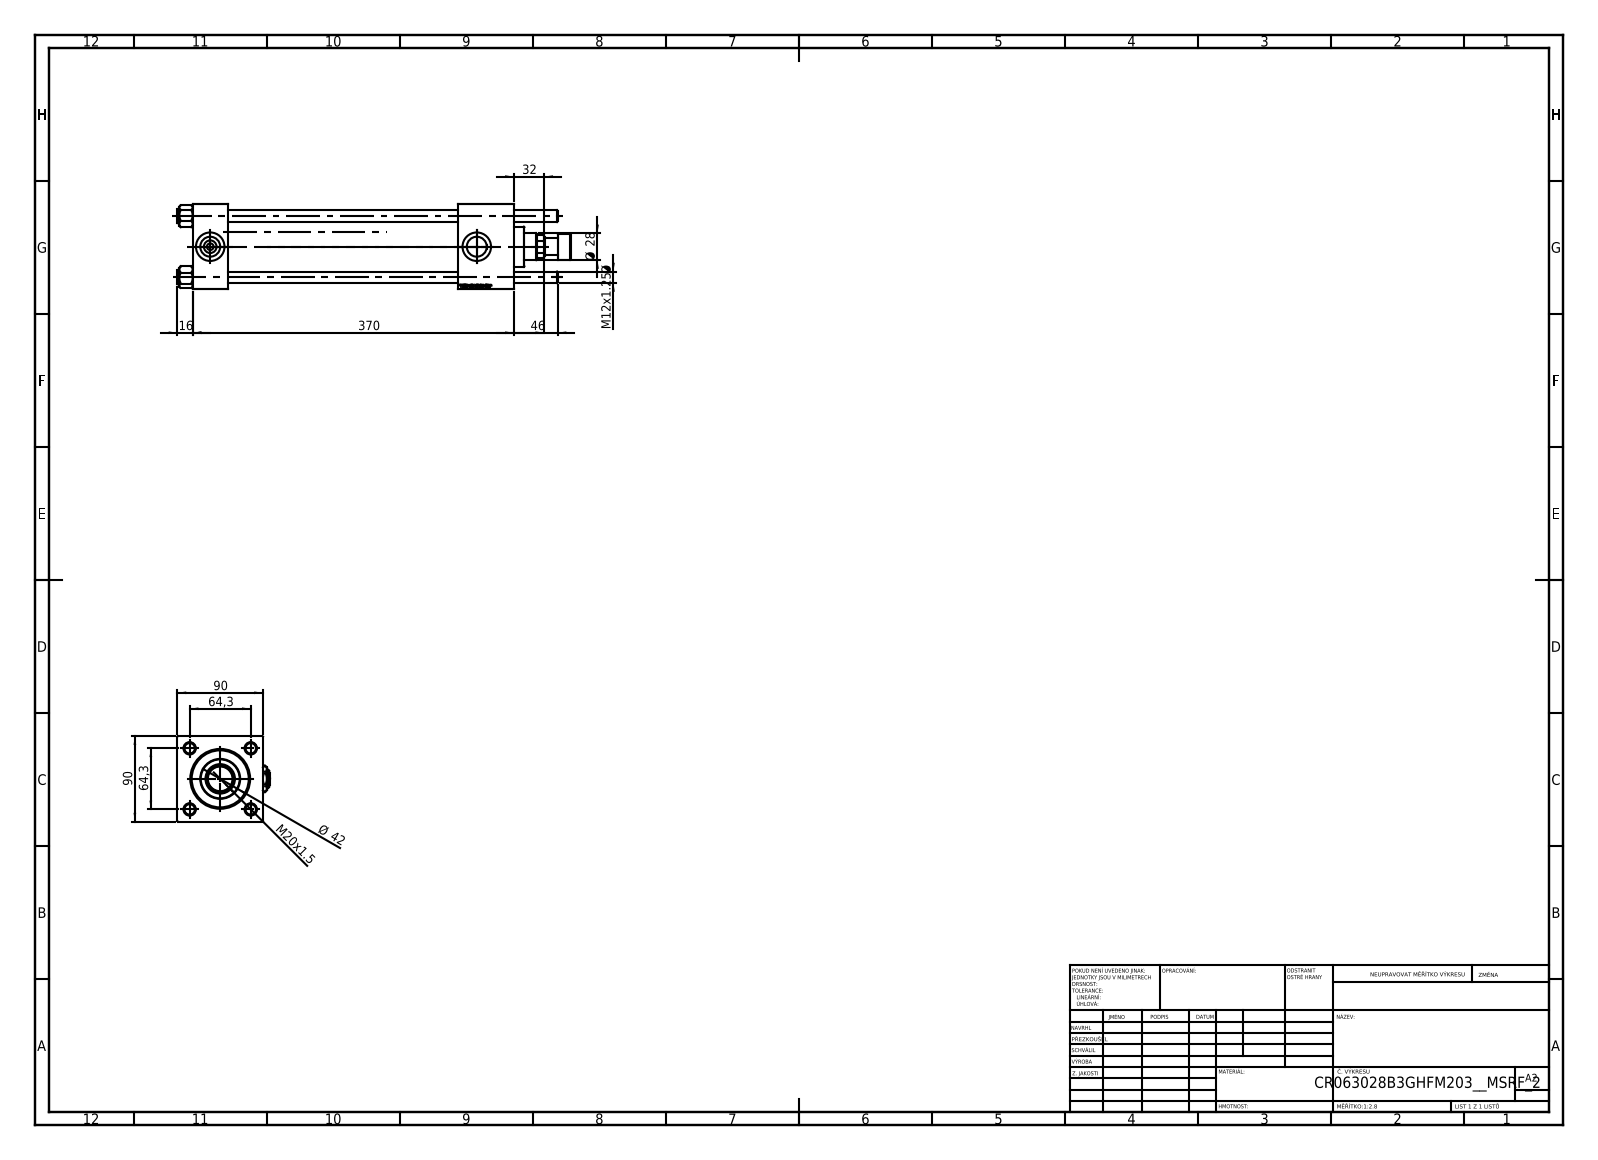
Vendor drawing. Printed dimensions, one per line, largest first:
370
90
90
64,3
64,3
46
Ø 42
32
Ø 28
M20x1.5
16
M12x1.25 Ø
